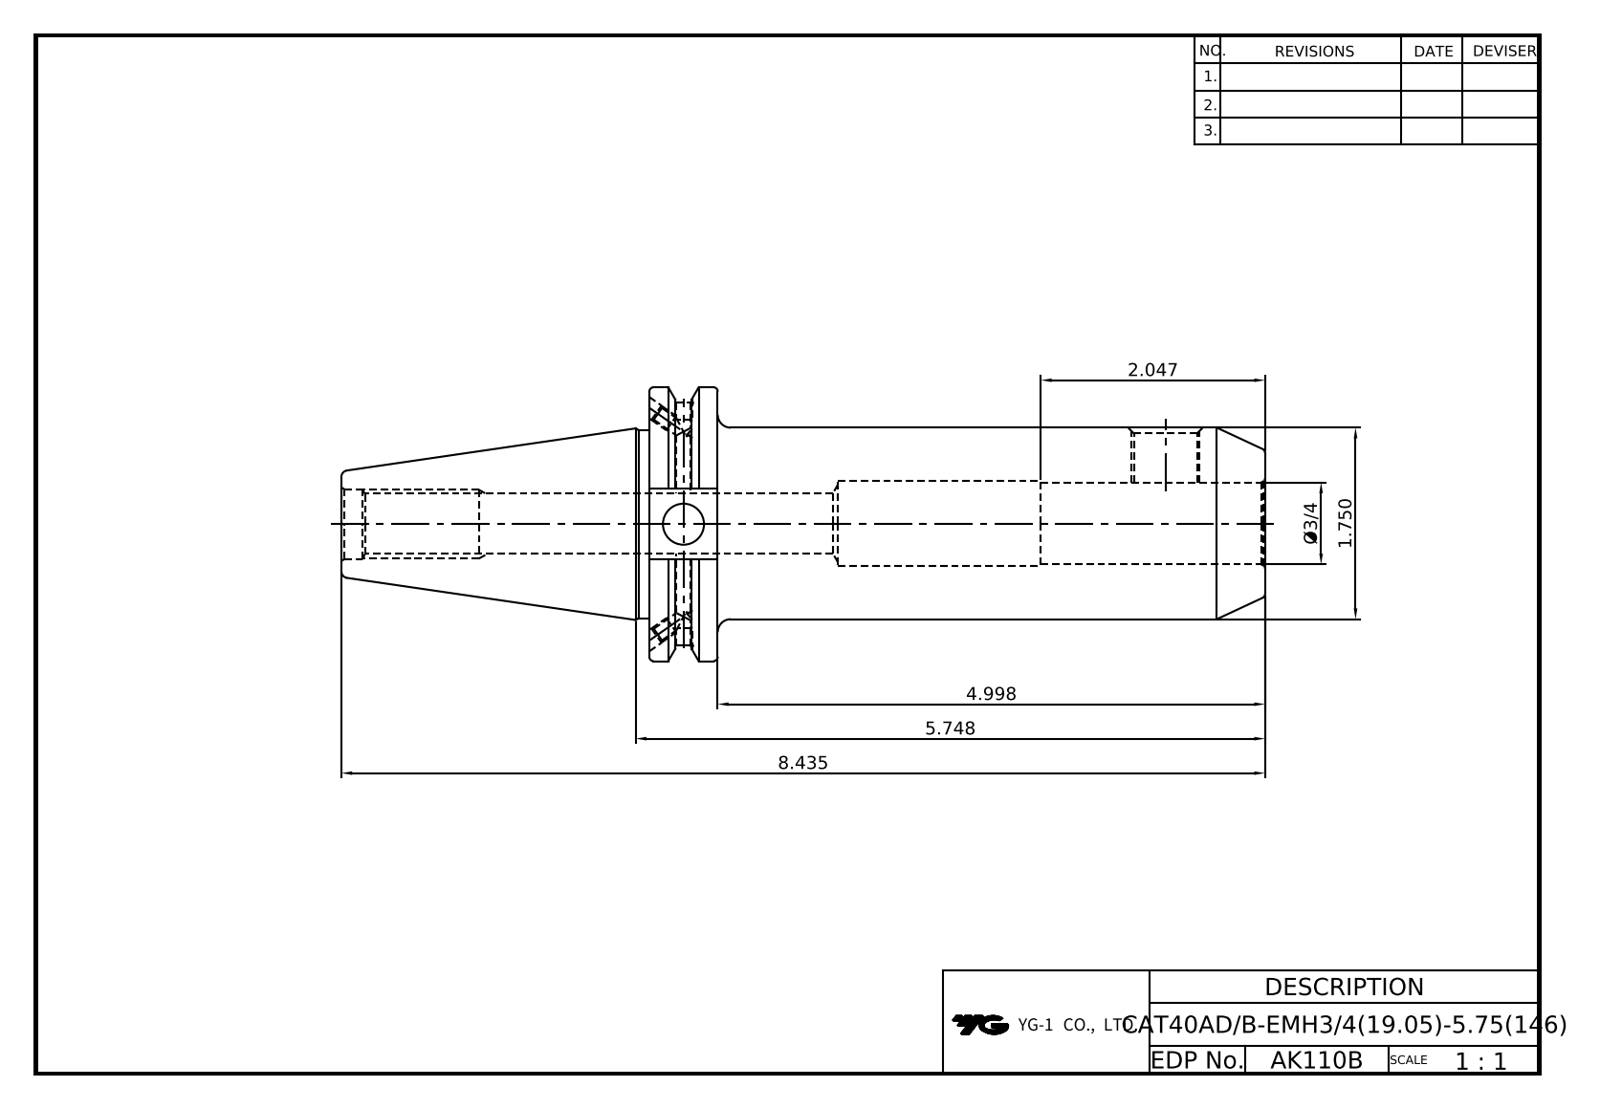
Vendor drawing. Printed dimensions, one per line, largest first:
8.435
5.748
4.998
2.047
1.750
Ø3/4
